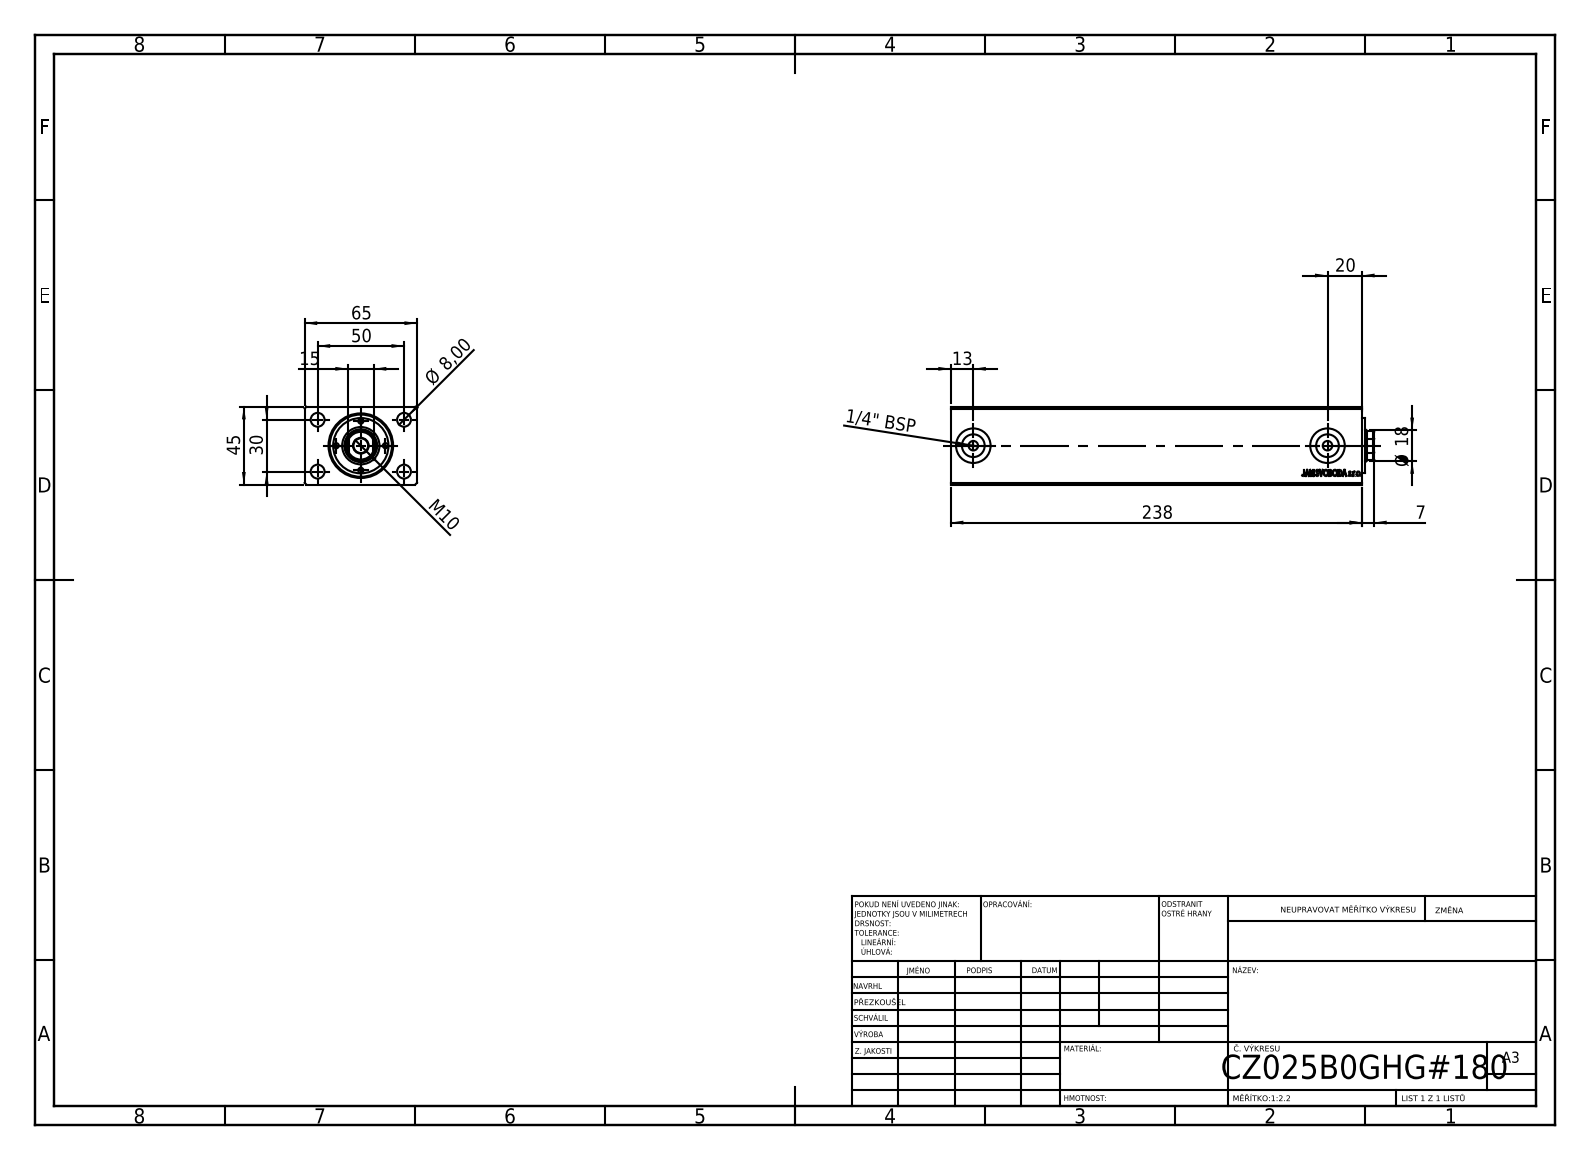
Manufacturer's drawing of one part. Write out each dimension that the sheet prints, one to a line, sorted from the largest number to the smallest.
238
65
50
45
30
20
Ø 18
15
13
M10
Ø 8,00
7
1/4" BSP
